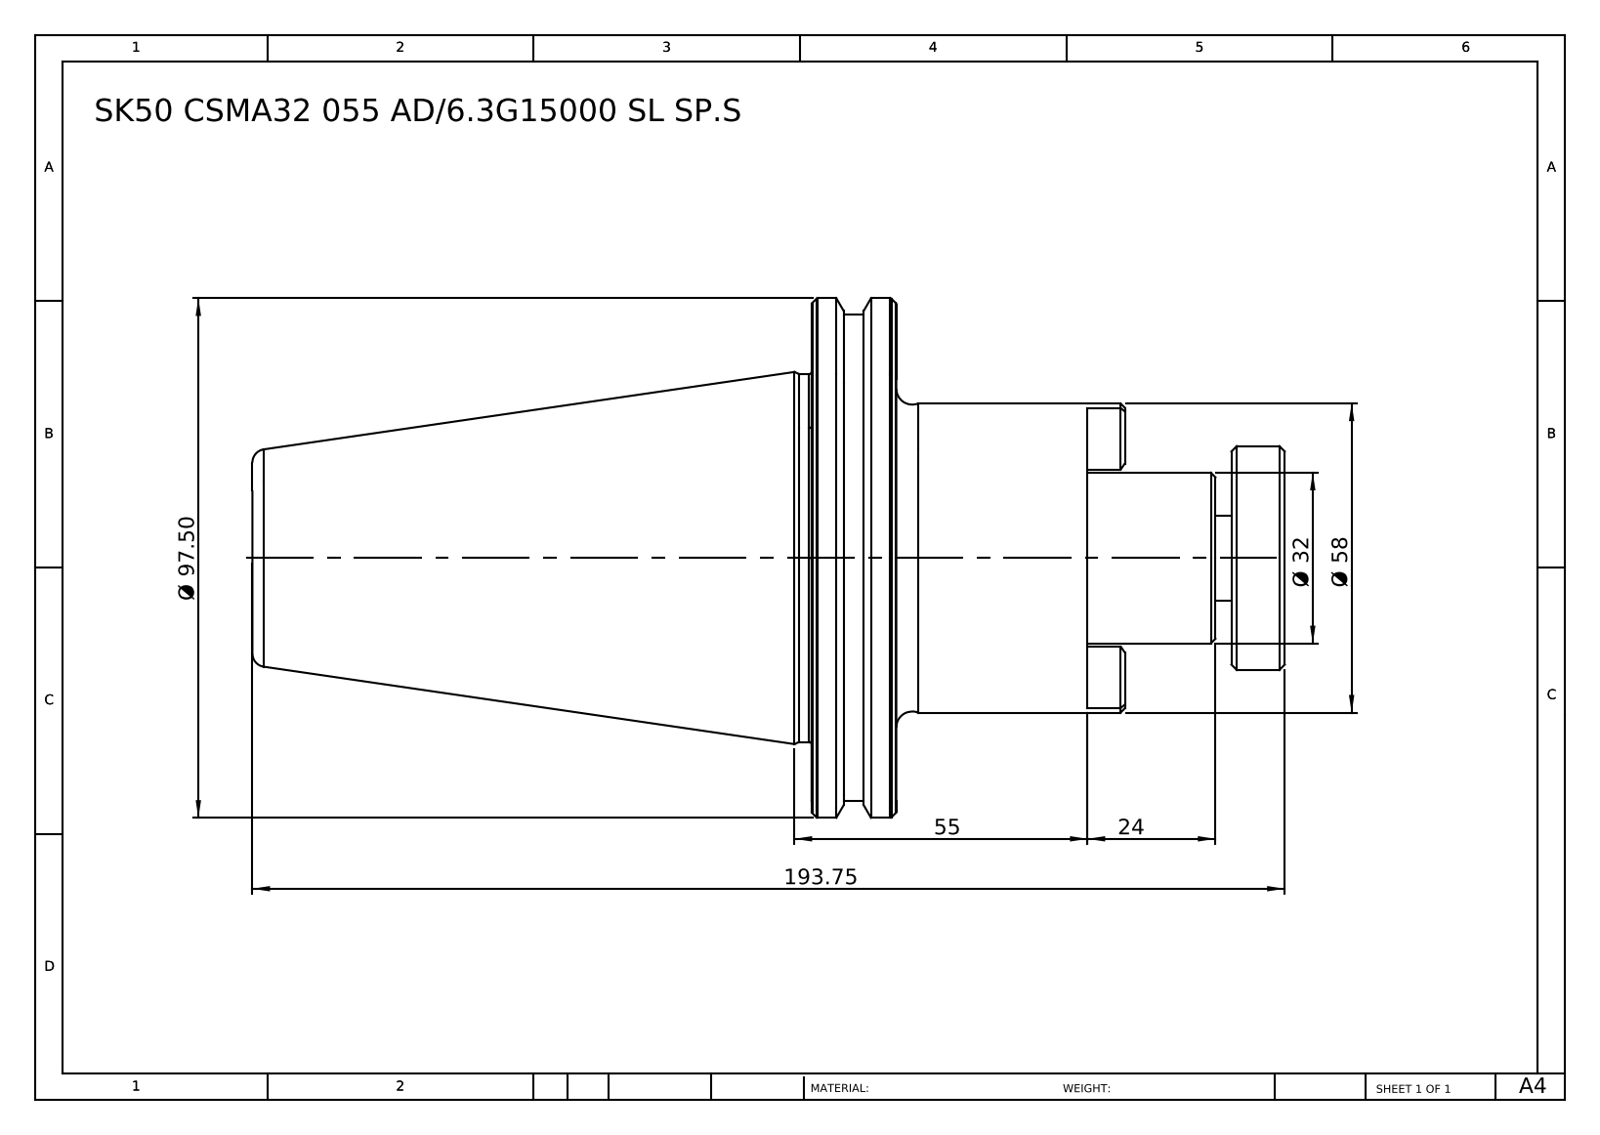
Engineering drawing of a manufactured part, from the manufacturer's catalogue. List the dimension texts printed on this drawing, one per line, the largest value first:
193.75
Ø 97.50
Ø 58
55
Ø 32
24
